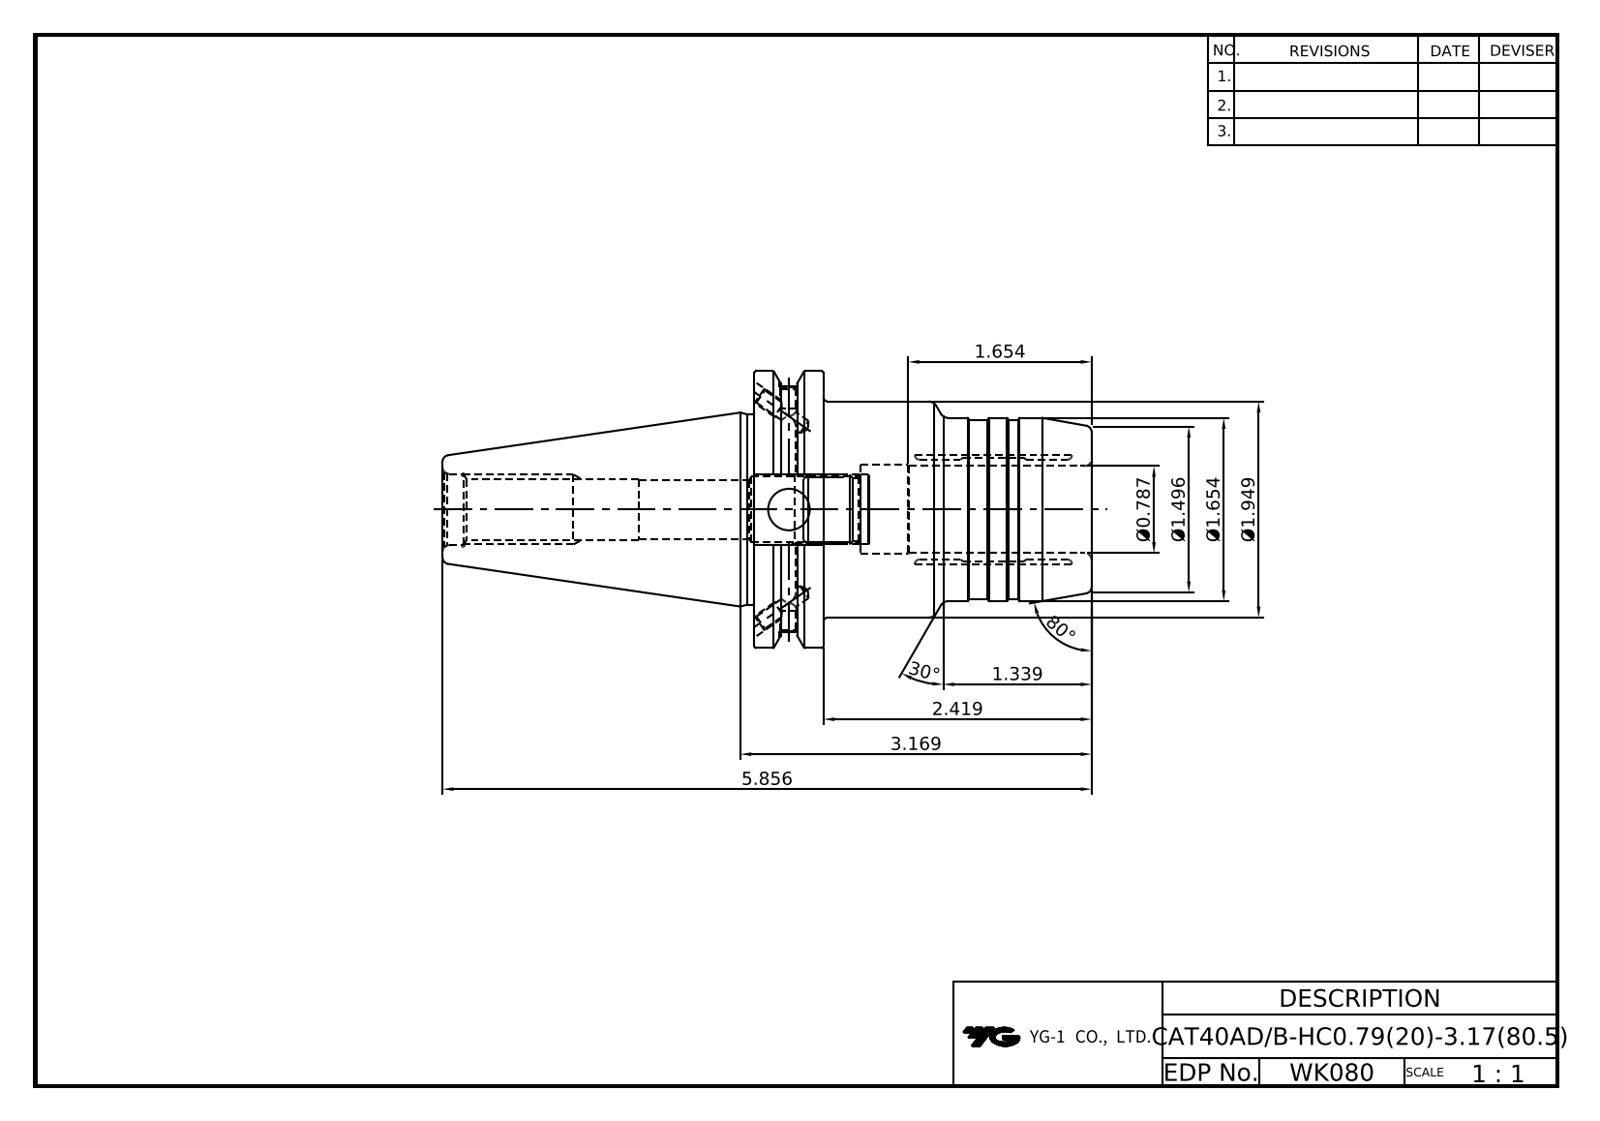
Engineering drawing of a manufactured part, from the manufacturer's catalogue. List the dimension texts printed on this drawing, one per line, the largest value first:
80°
30°
5.856
3.169
2.419
Ø1.949
Ø1.654
1.654
Ø1.496
1.339
Ø0.787
